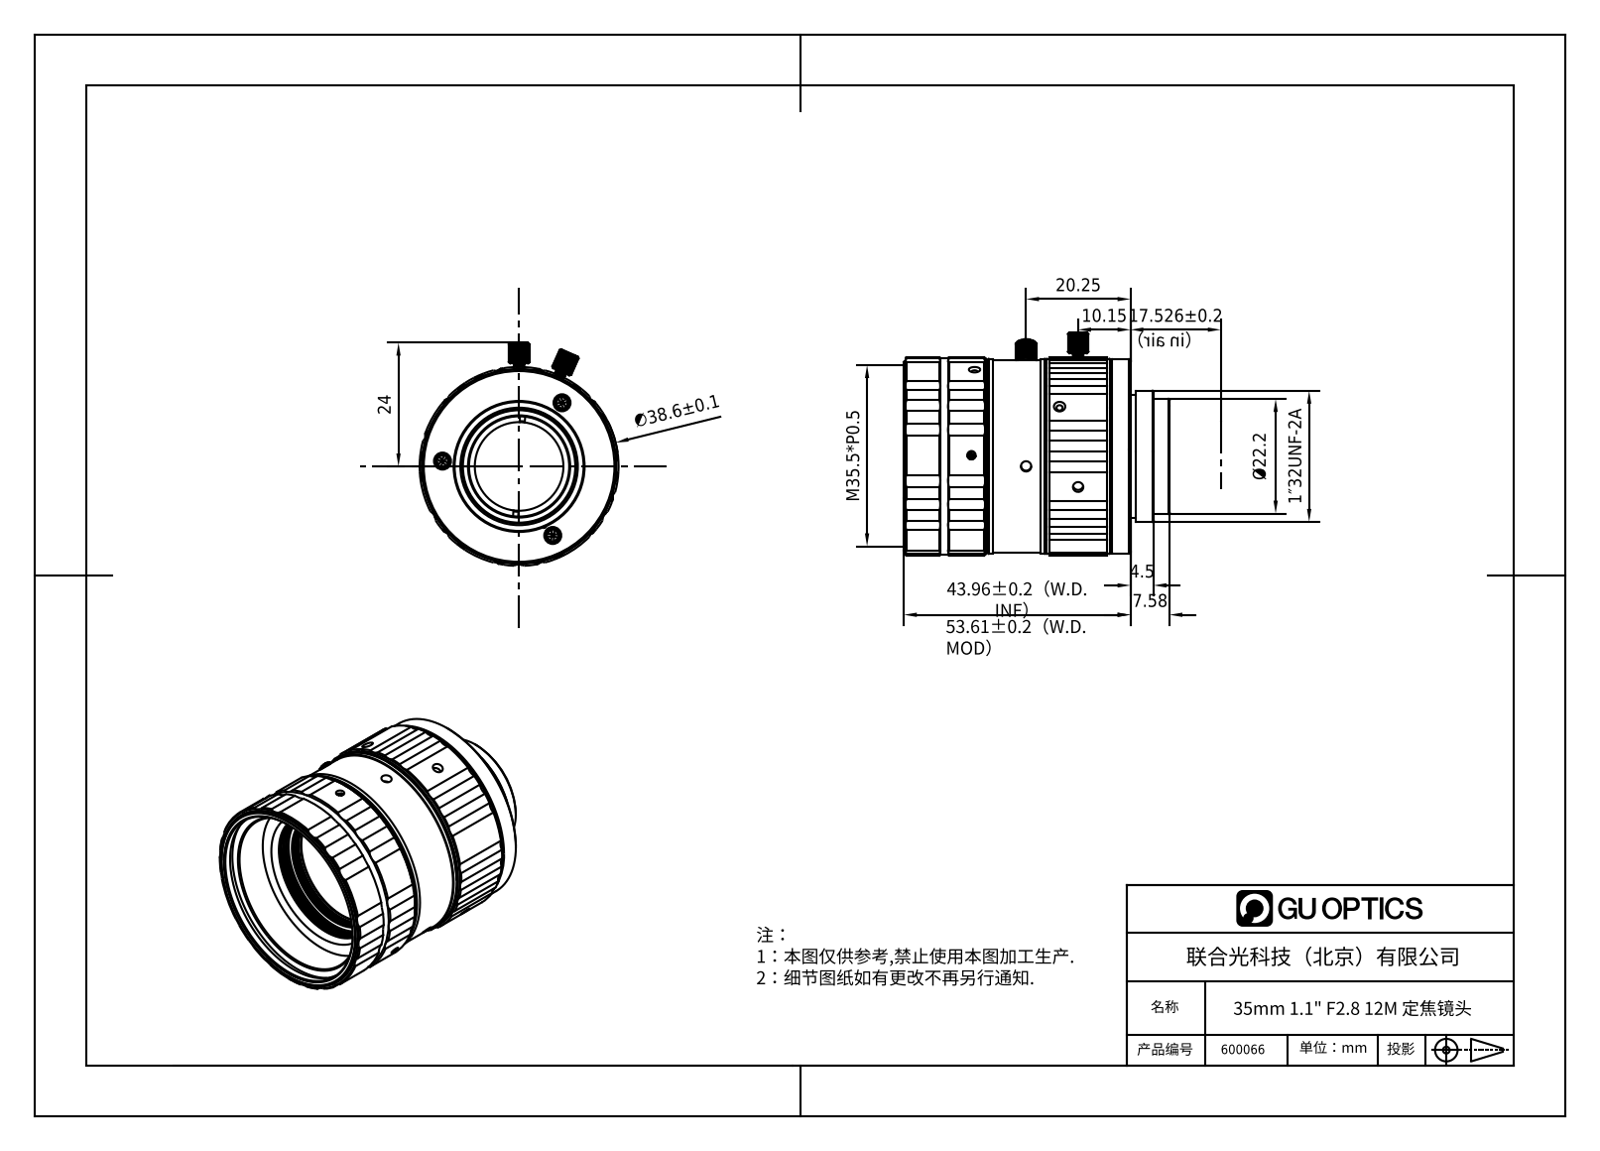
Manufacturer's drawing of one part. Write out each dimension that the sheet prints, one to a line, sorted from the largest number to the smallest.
43.96±0.2（W.D. INF）
∅38.6±0.1
M35.5*P0.5
24
Ø22.2
20.25
17.526±0.2
10.15
7.58
4.5
1″32UNF-2A
